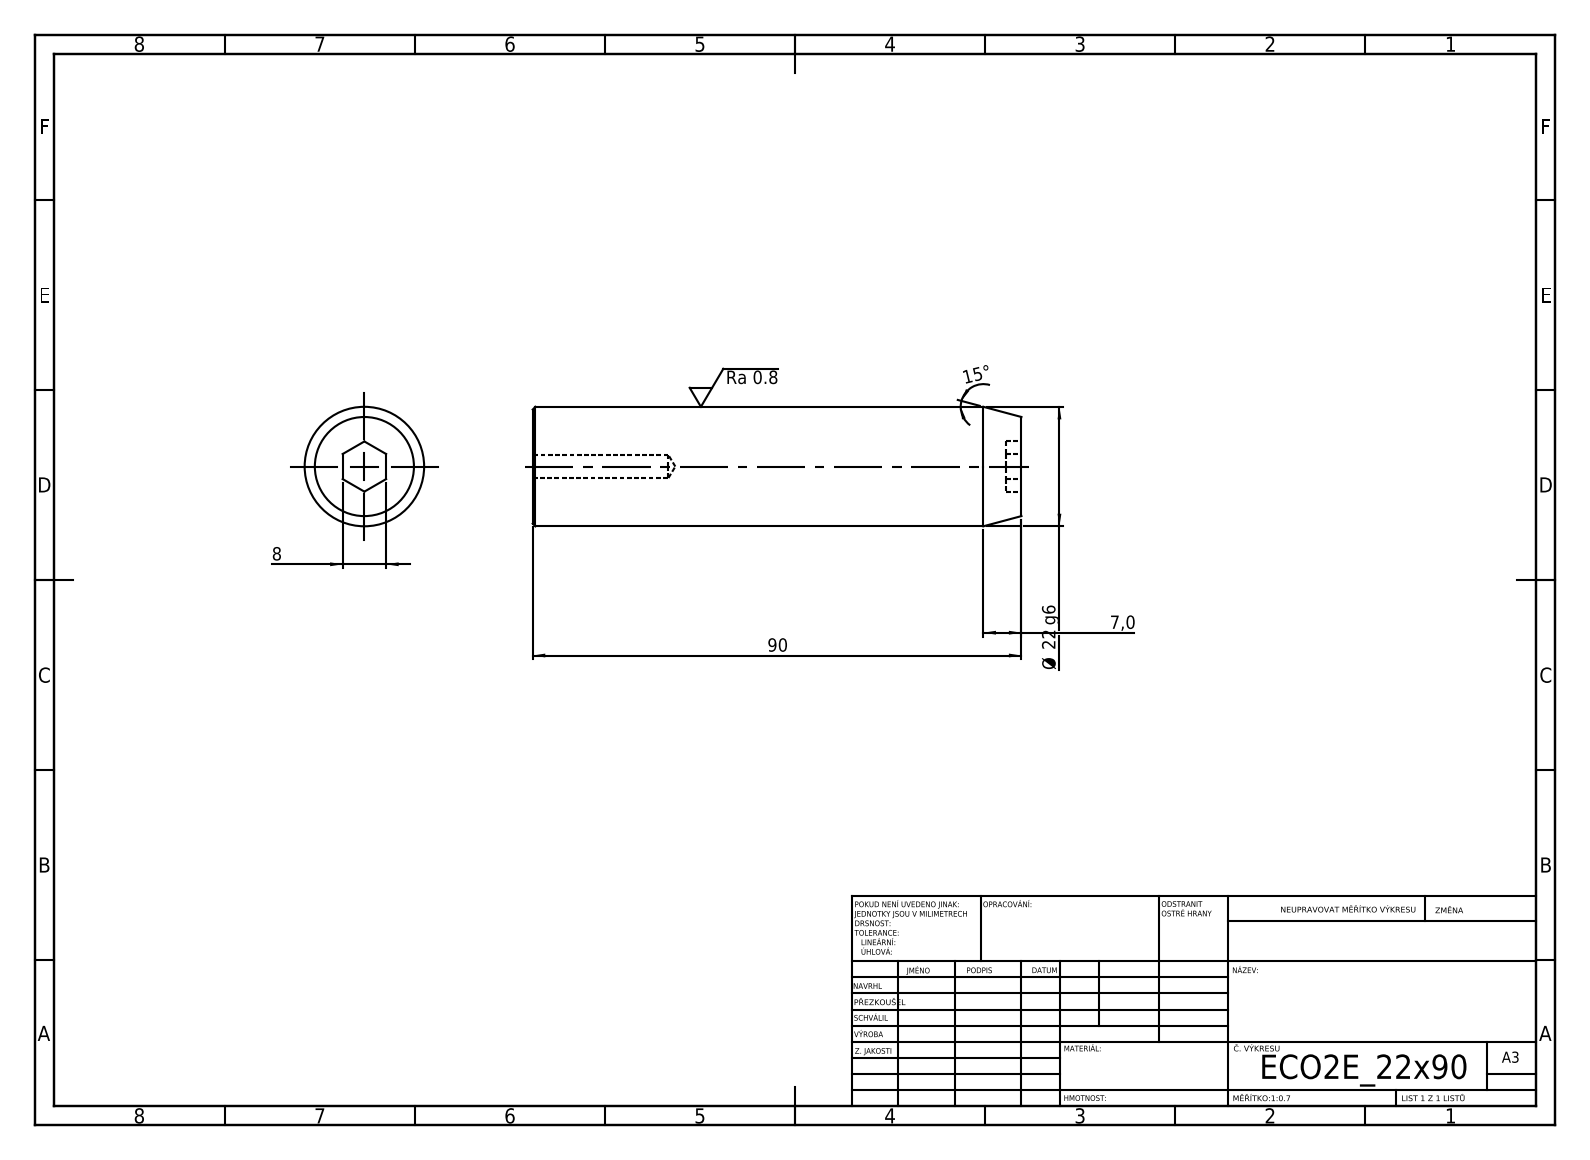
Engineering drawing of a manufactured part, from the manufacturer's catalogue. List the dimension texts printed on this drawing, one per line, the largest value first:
90
Ø 22 g6
15°
8
7,0
